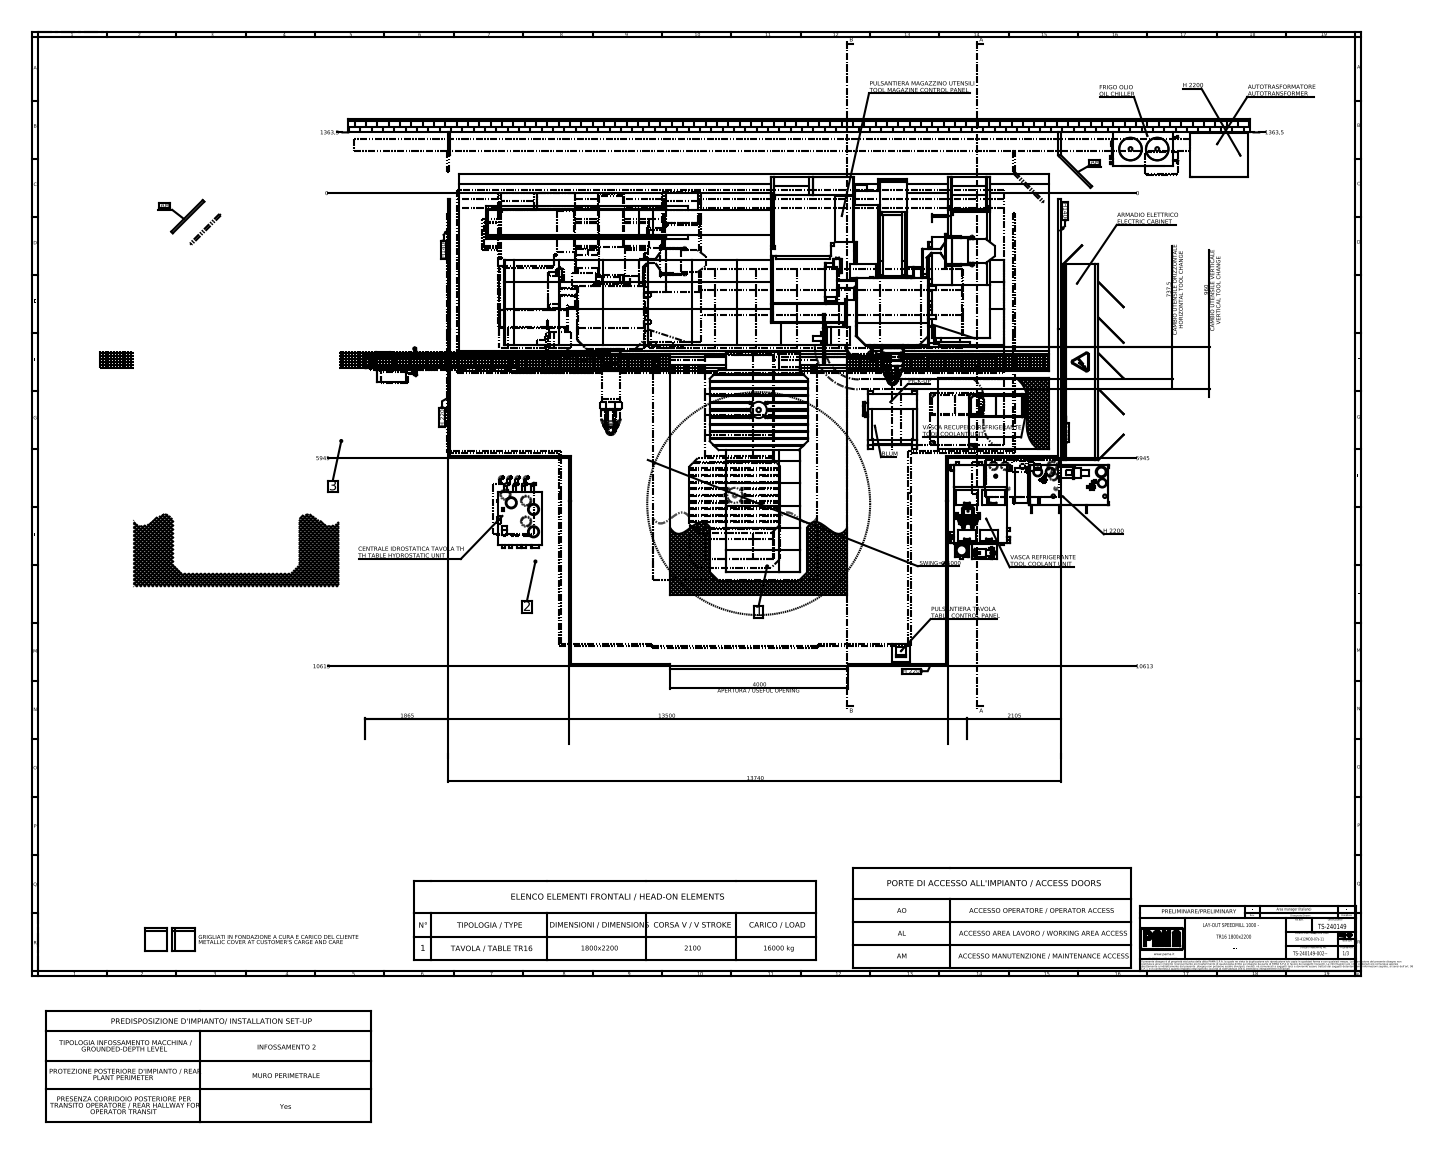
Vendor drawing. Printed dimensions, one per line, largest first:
13740
13500
10613
10613
5945
5945
SWING= Ø 5000
4000 APERTURA / USEFUL OPENING
2105
1865
1363,5
1363,5
960 CAMBIO UTENSILE VERTICALE VERTICAL TOOL CHANGE
737,5 CAMBIO UTENSILE ORIZZONTALE HORIZONTAL TOOL CHANGE
0
0
